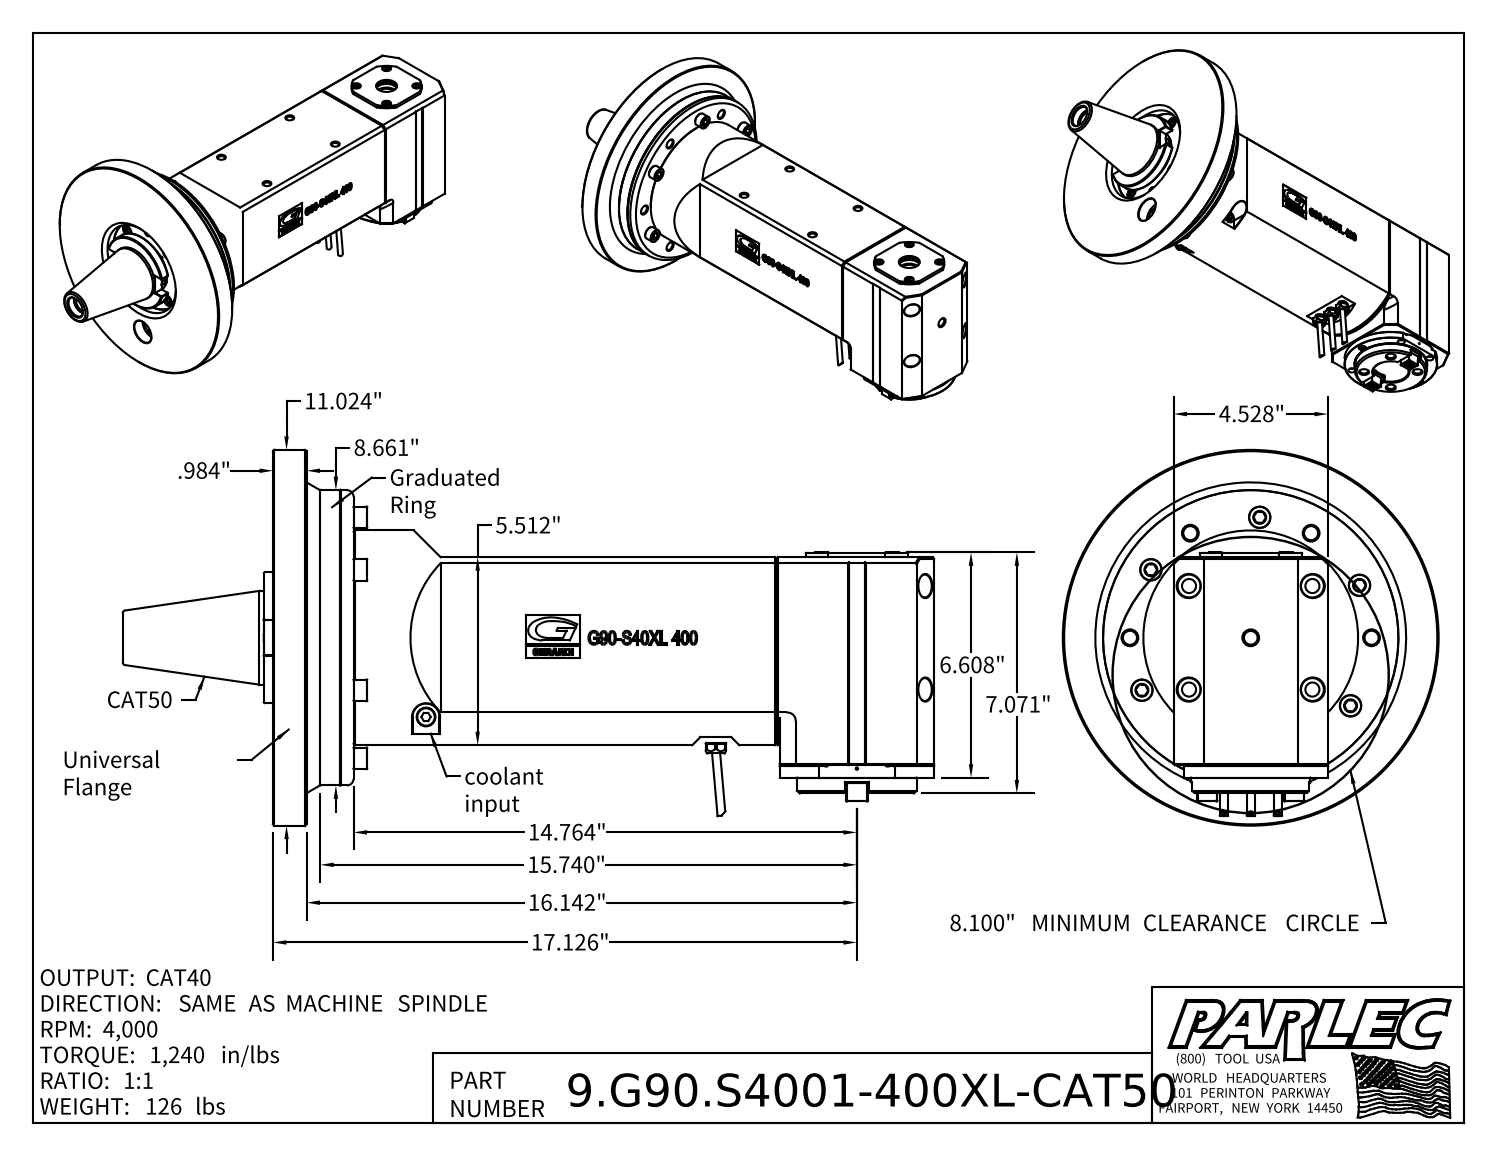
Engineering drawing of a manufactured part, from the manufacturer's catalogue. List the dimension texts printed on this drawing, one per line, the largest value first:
17.126"
16.142"
15.740"
14.764"
11.024"
8.661"
7.071"
6.608"
5.512"
4.528"
.984"
